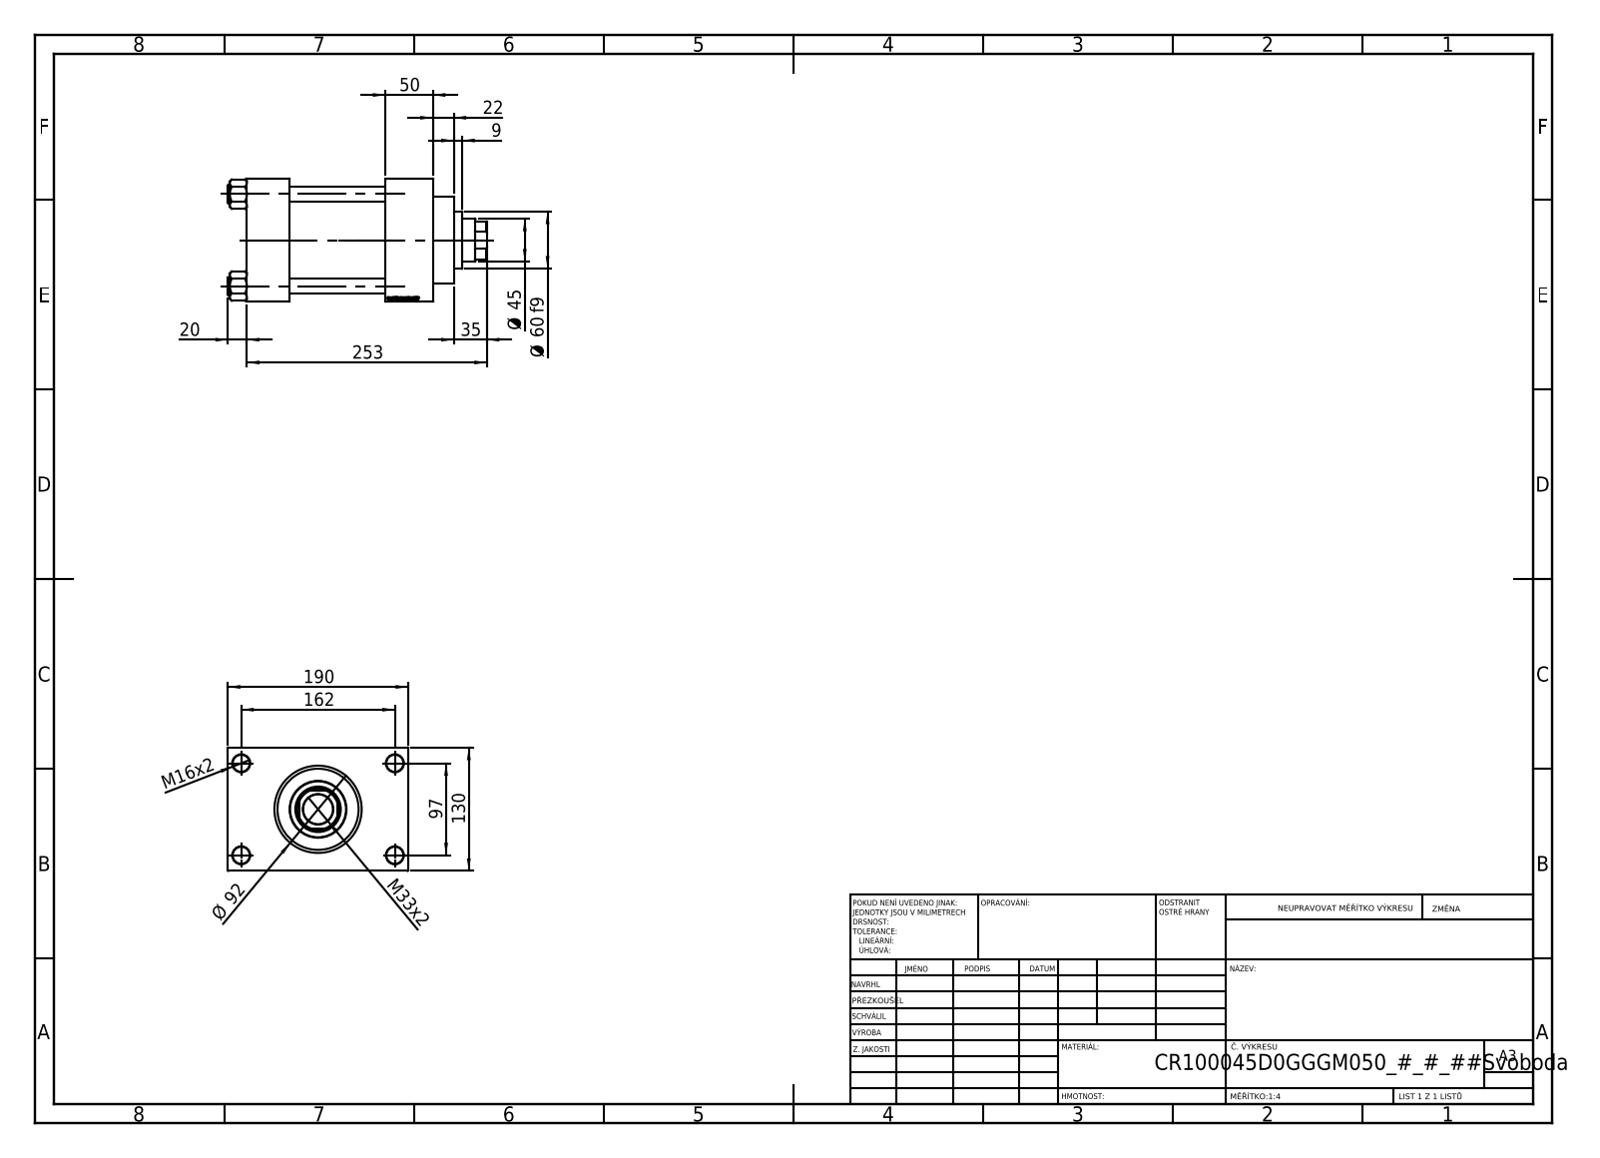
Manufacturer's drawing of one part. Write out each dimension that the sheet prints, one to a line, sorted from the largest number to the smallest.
253
190
162
130
97
Ø 92
Ø 60 f9
50
Ø 45
35
M33x2
22
20
M16x2
9
